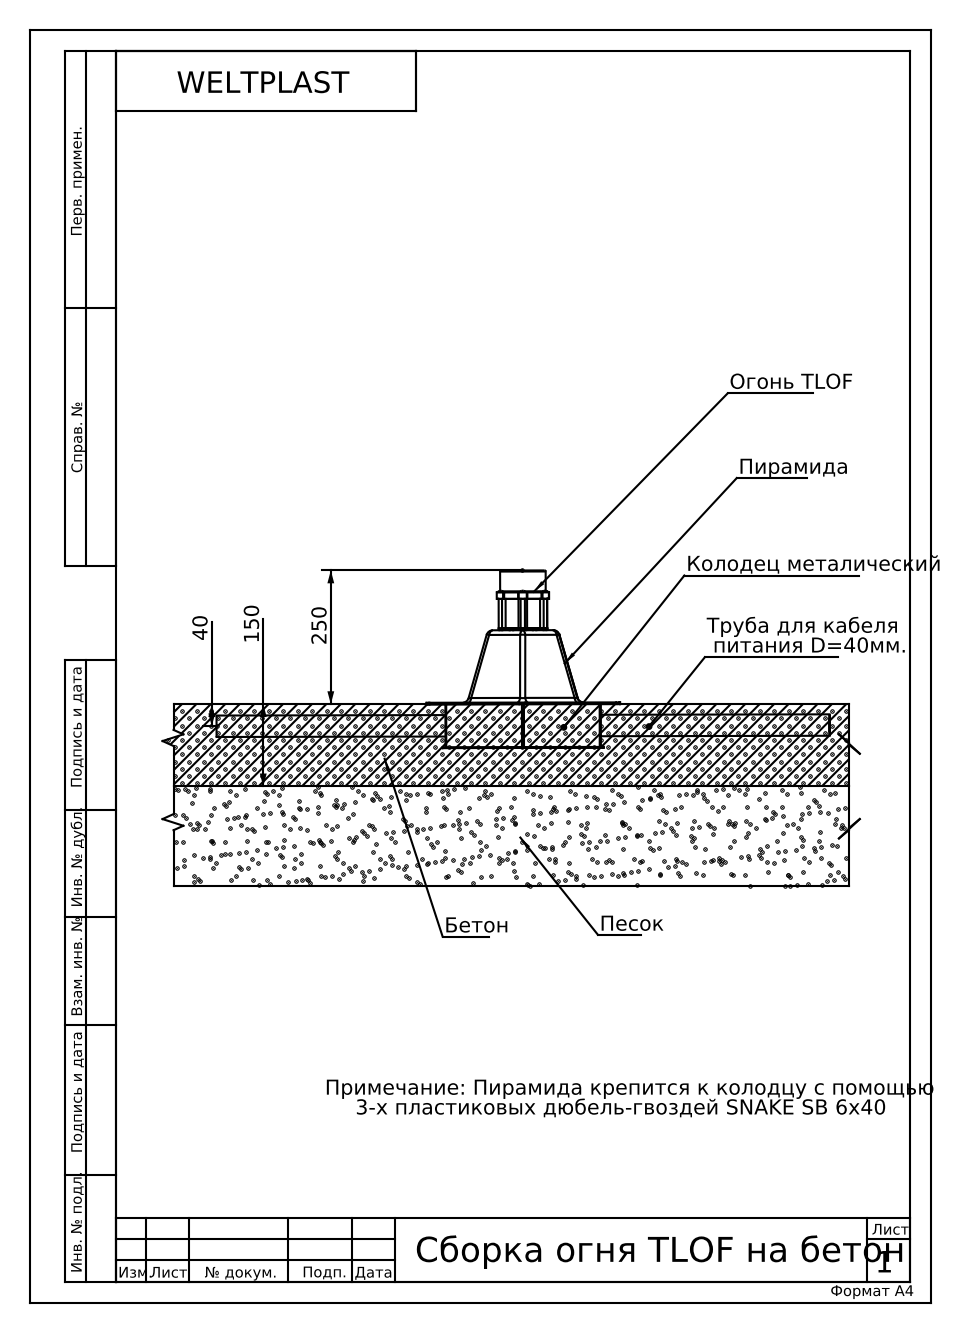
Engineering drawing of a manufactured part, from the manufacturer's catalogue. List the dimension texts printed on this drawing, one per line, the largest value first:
250
150
40
